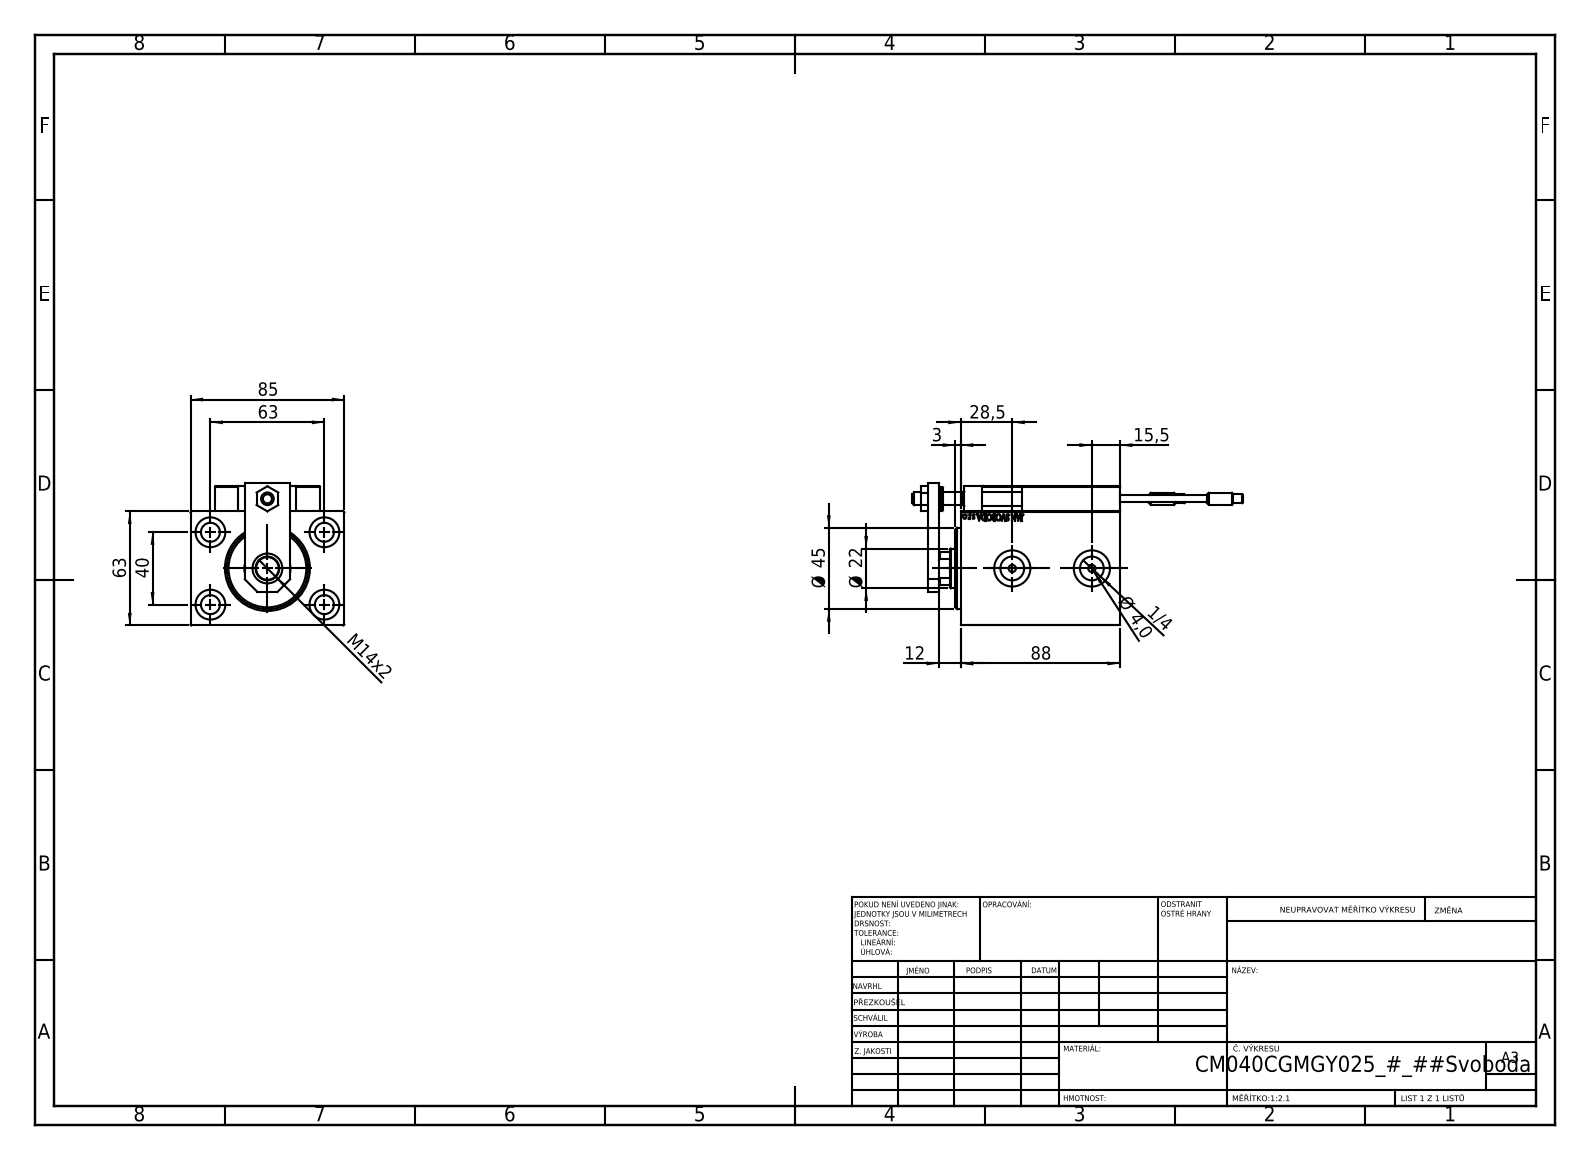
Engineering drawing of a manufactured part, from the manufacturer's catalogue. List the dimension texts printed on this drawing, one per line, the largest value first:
88
85
63
63
Ø 45
40
28,5
Ø 22
15,5
M14x2
12
Ø 4,0
3
1/4
